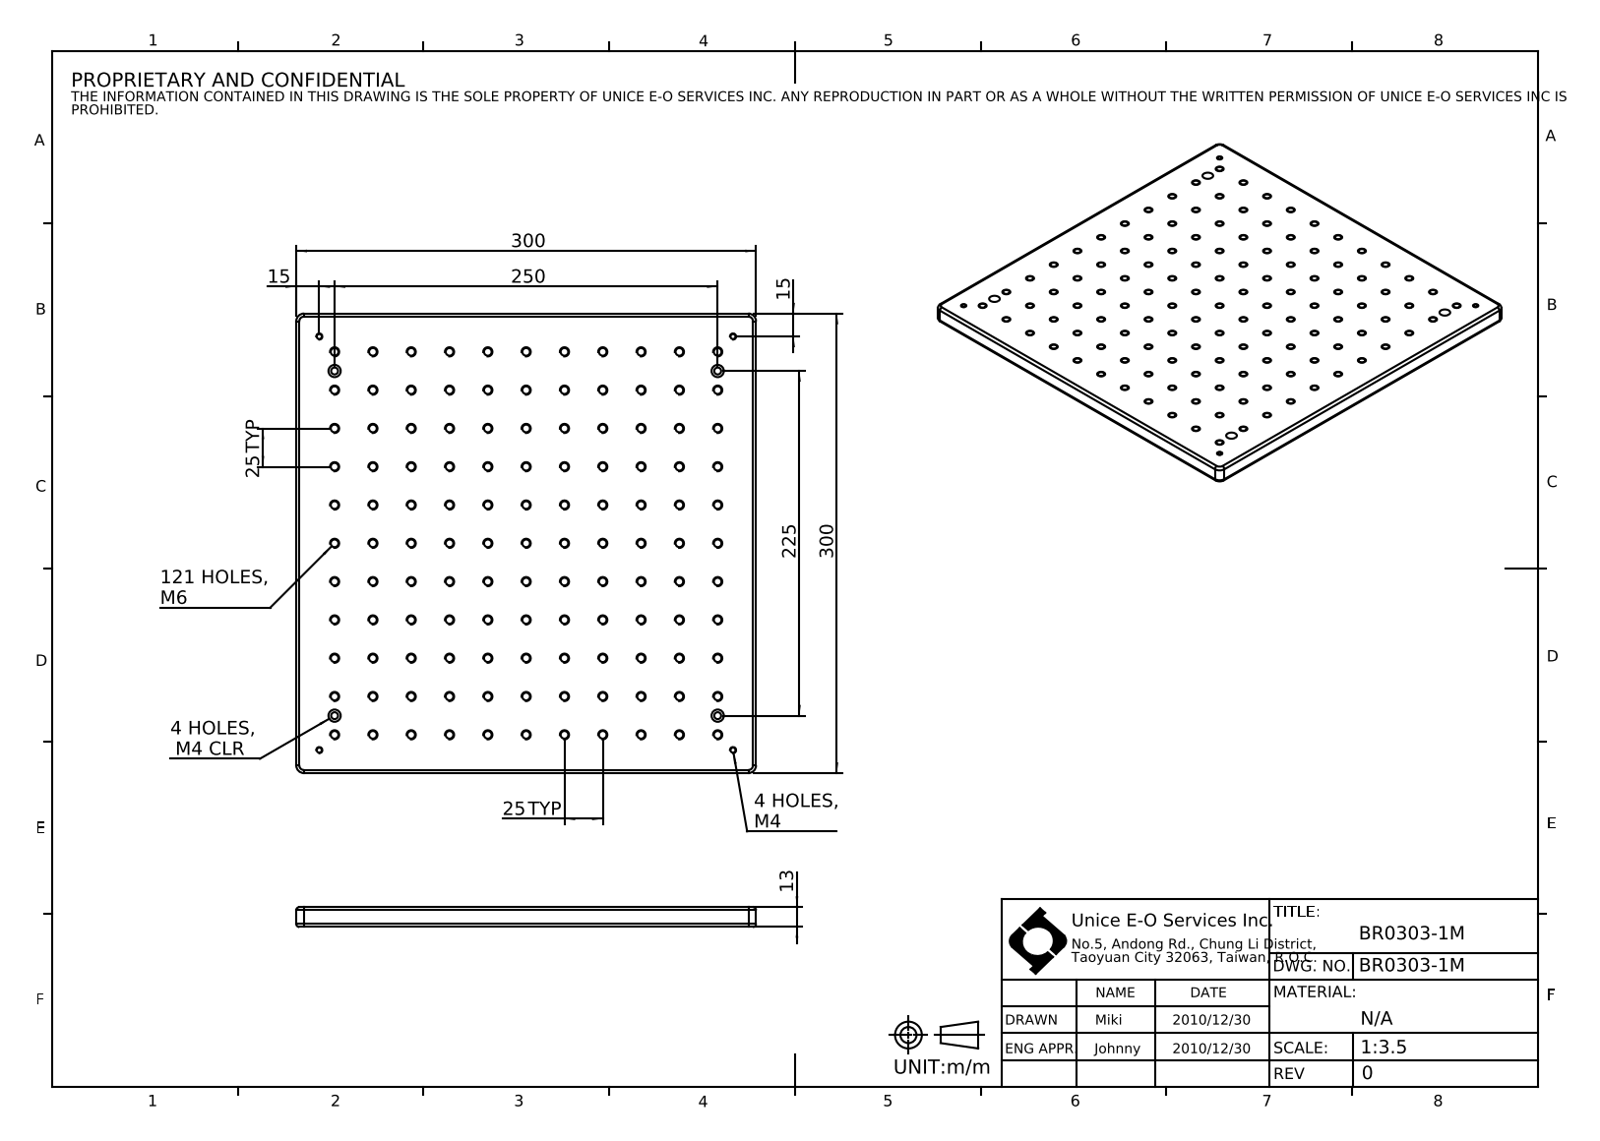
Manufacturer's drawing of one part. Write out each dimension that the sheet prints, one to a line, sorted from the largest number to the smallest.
300
300
250
225
121 HOLES, M6
25 TYP
25 TYP
15
15
13
4 HOLES, M4
4 HOLES, M4 CLR
